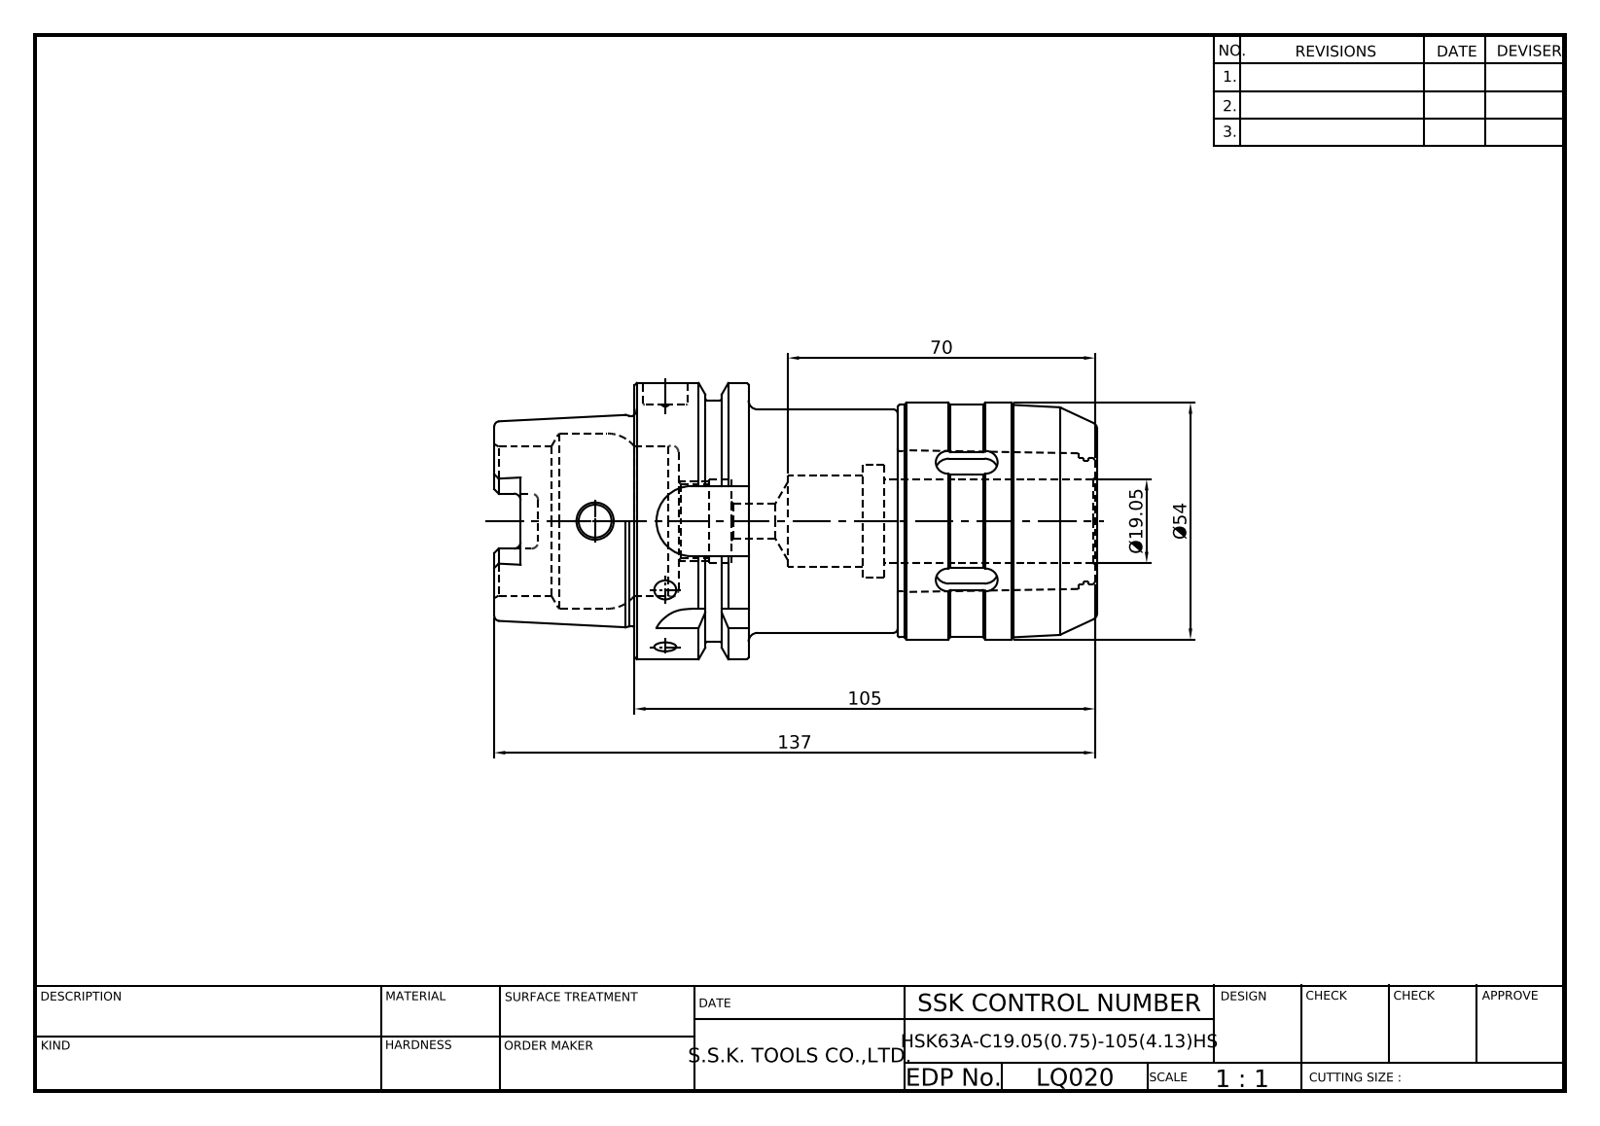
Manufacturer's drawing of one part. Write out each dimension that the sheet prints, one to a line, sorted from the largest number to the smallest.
137
105
70
Ø54
Ø19.05
